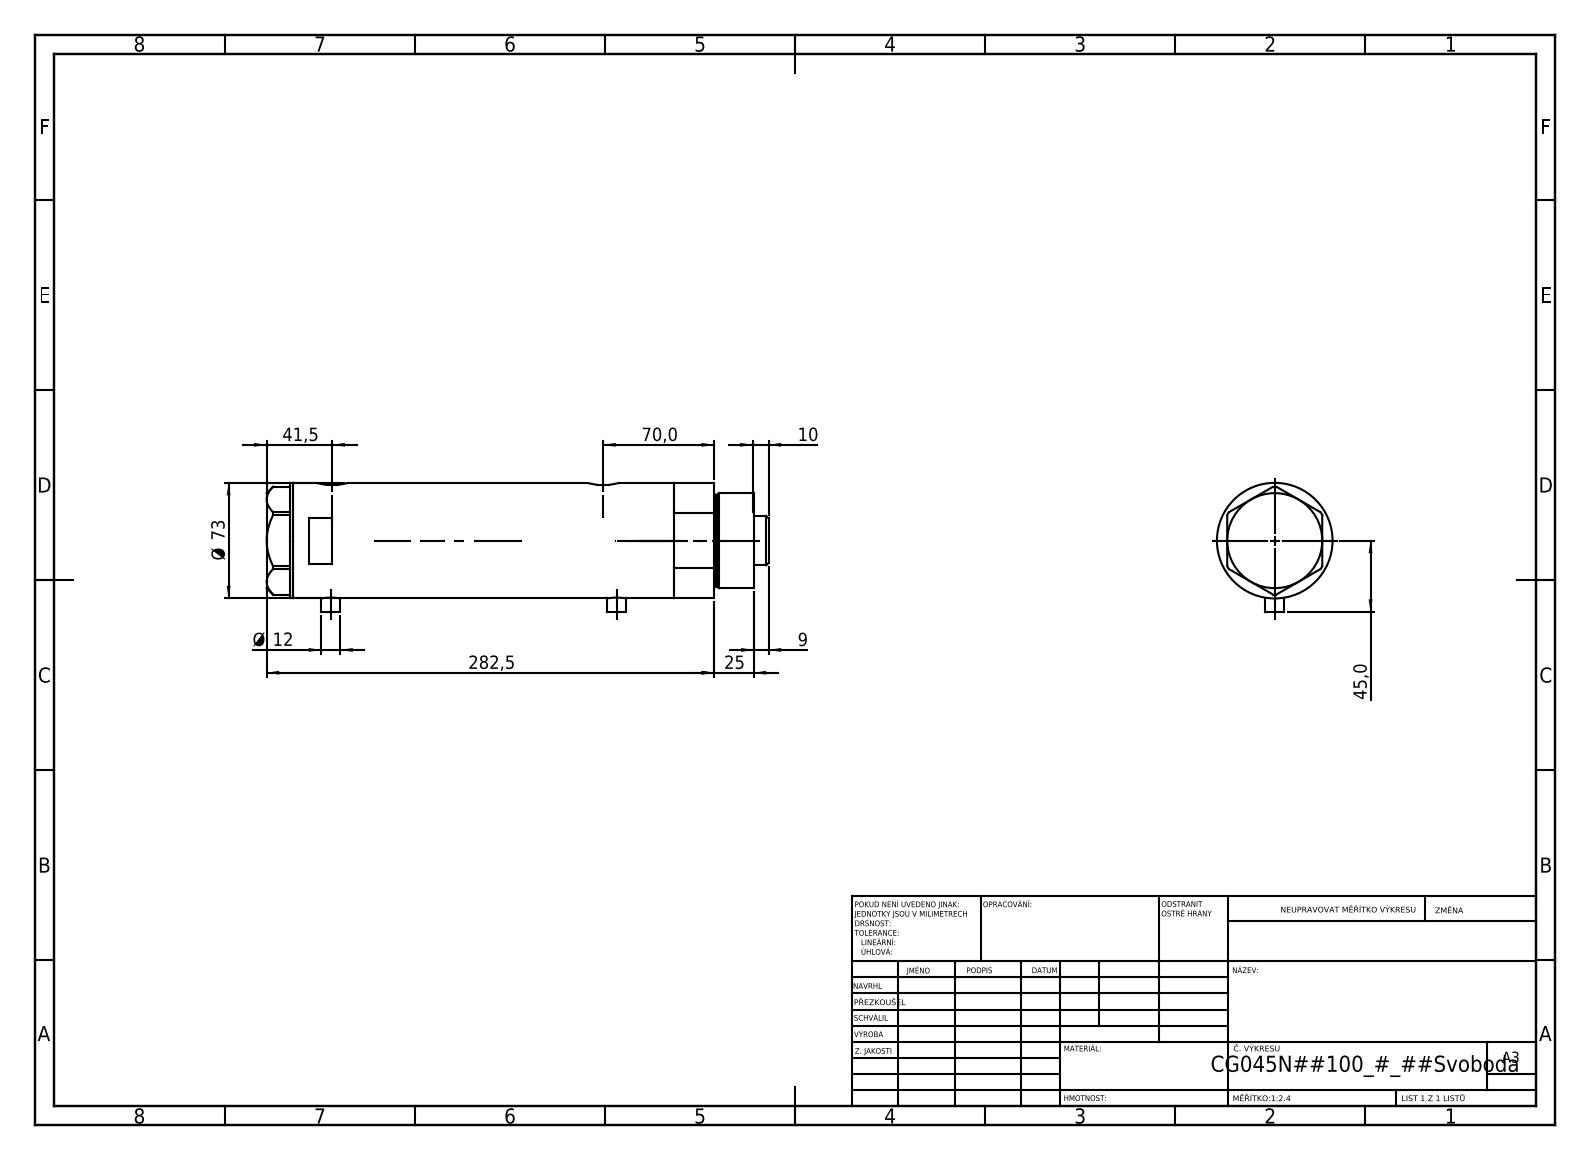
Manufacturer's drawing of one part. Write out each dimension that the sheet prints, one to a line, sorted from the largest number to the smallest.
282,5
Ø 73
70,0
45,0
41,5
25
Ø 12
10
9
